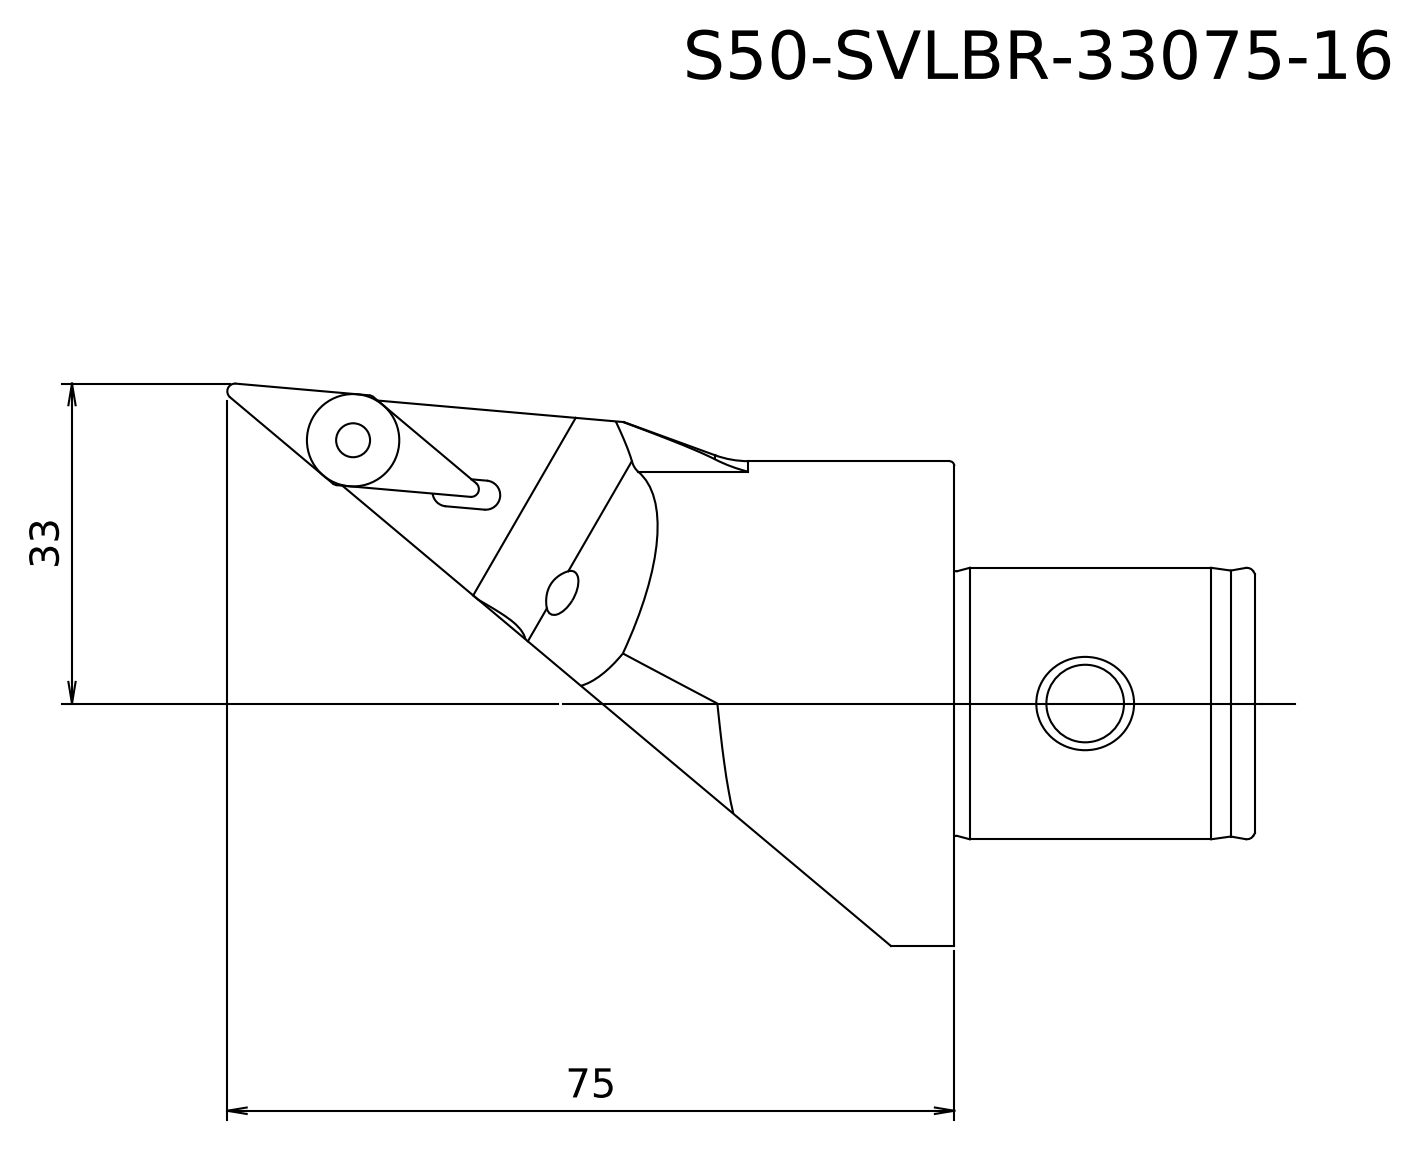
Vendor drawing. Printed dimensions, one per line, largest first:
75
33
